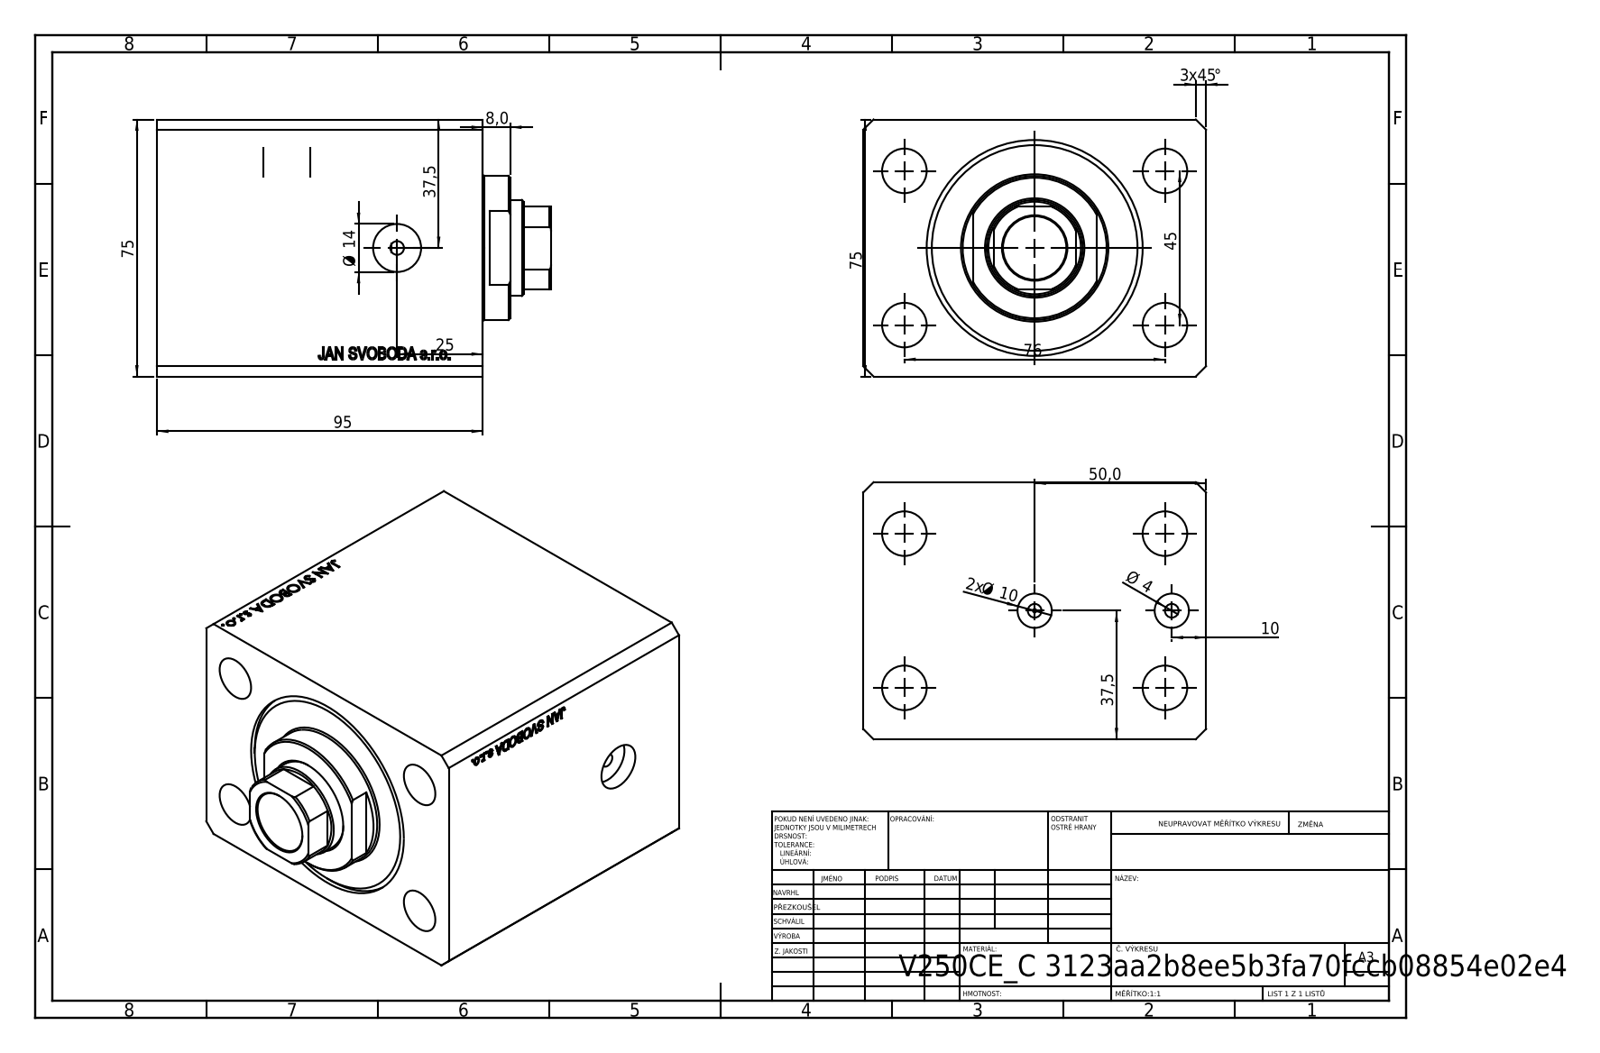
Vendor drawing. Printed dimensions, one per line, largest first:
95
76
75
75
50,0
3 x45 °
45
37,5
37,5
25
Ø 14
2x Ø 10
10
8,0
Ø 4
